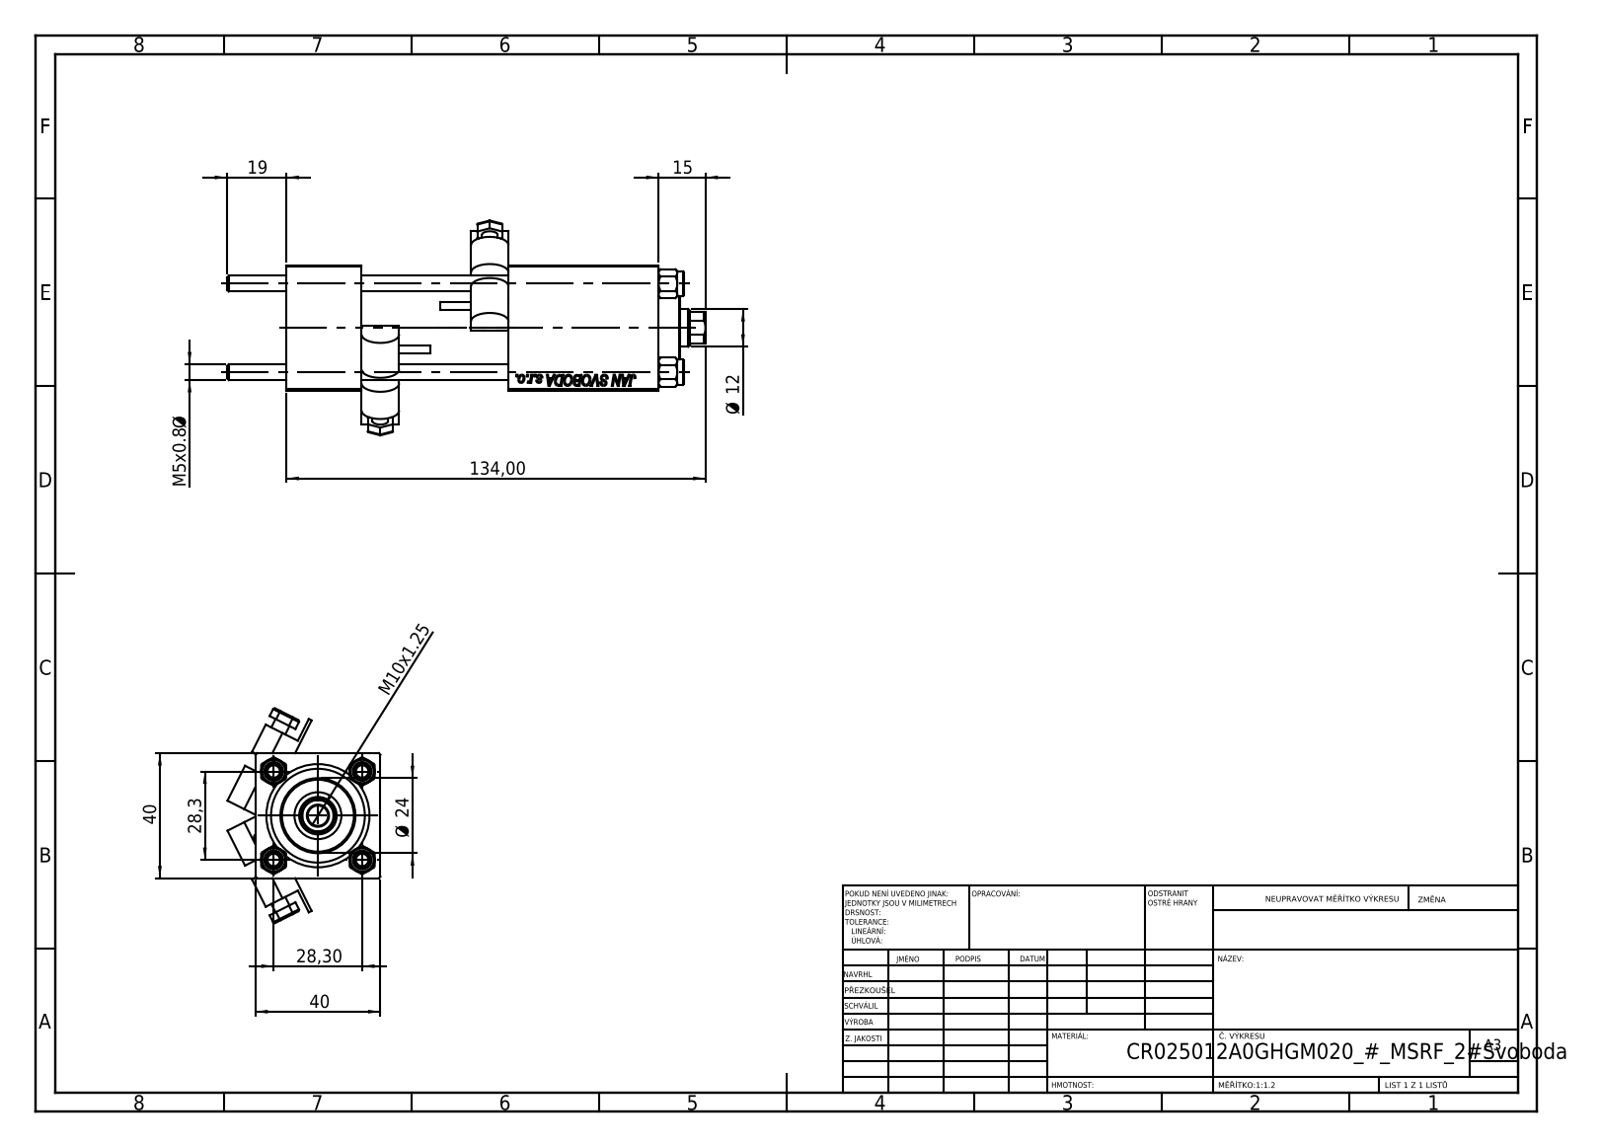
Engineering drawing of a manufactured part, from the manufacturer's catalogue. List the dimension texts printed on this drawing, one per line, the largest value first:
134,00
40
40
28,3
28,30
Ø 24
19
15
Ø 12
M10x1.25
M5x0.8 Ø
